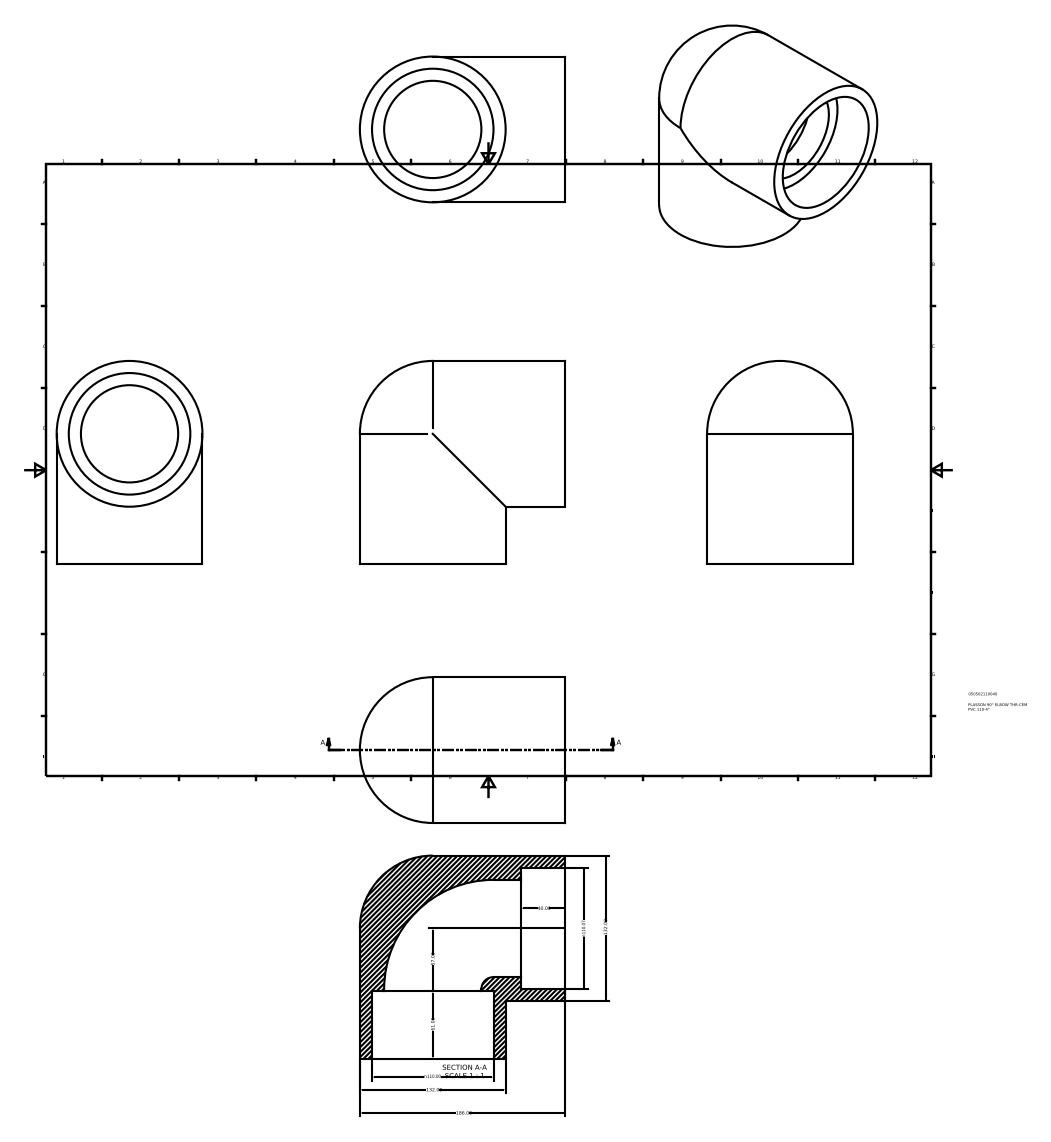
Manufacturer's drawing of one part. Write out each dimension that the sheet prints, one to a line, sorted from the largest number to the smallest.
186.00
132.00
132.00
n110.07
n110.00
61.00
57.00
40.00
